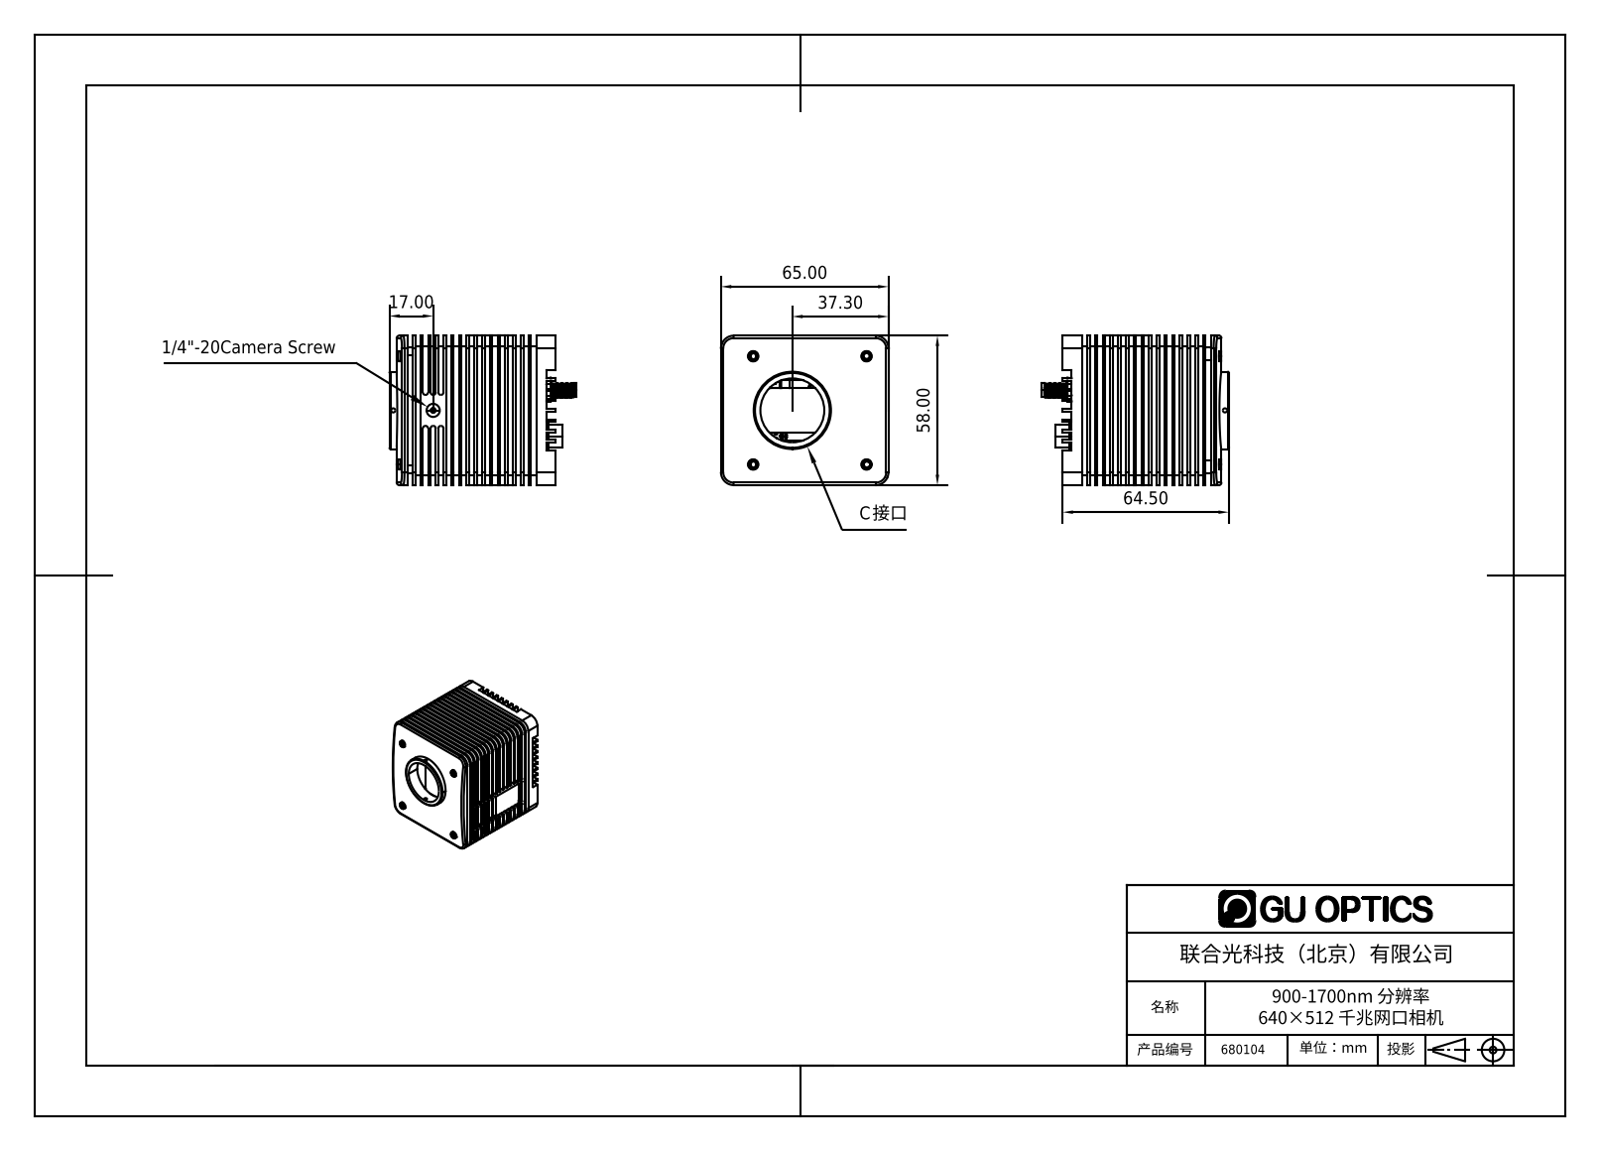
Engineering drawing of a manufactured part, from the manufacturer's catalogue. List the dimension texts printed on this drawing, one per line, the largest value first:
65.00
64.50
58.00
37.30
17.00
